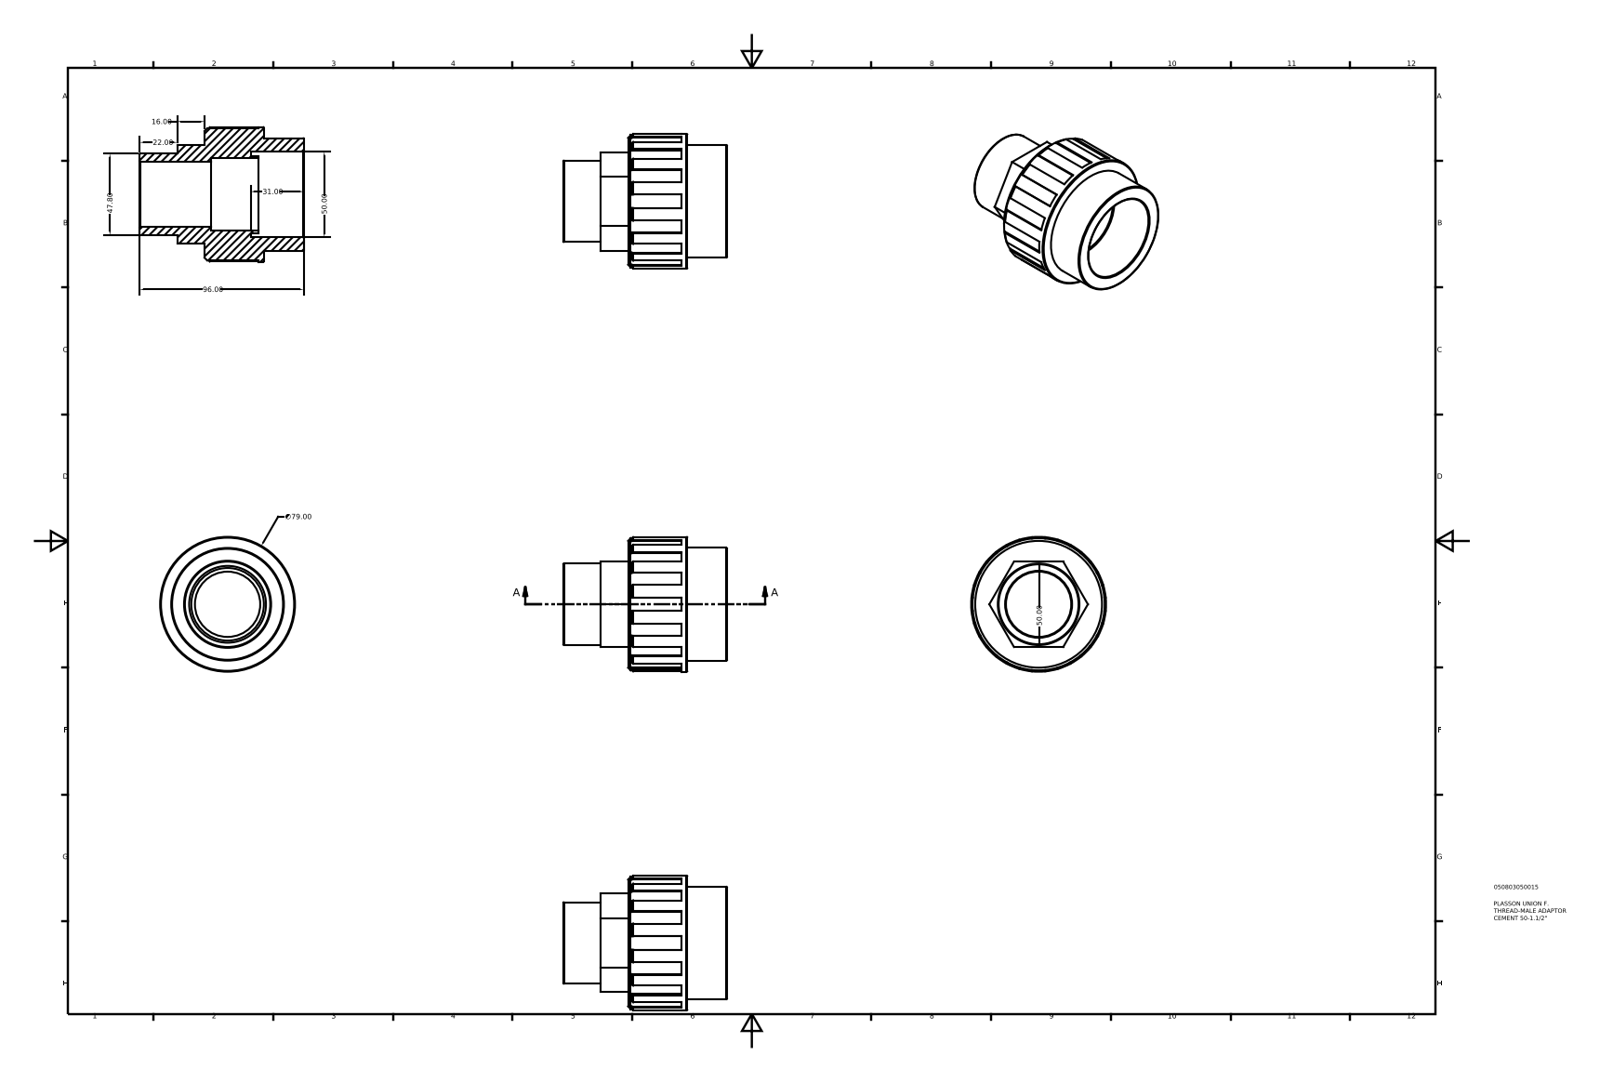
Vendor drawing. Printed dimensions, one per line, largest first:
96.00
∅79.00
50.00
50.00
47.80
31.00
22.00
16.00
